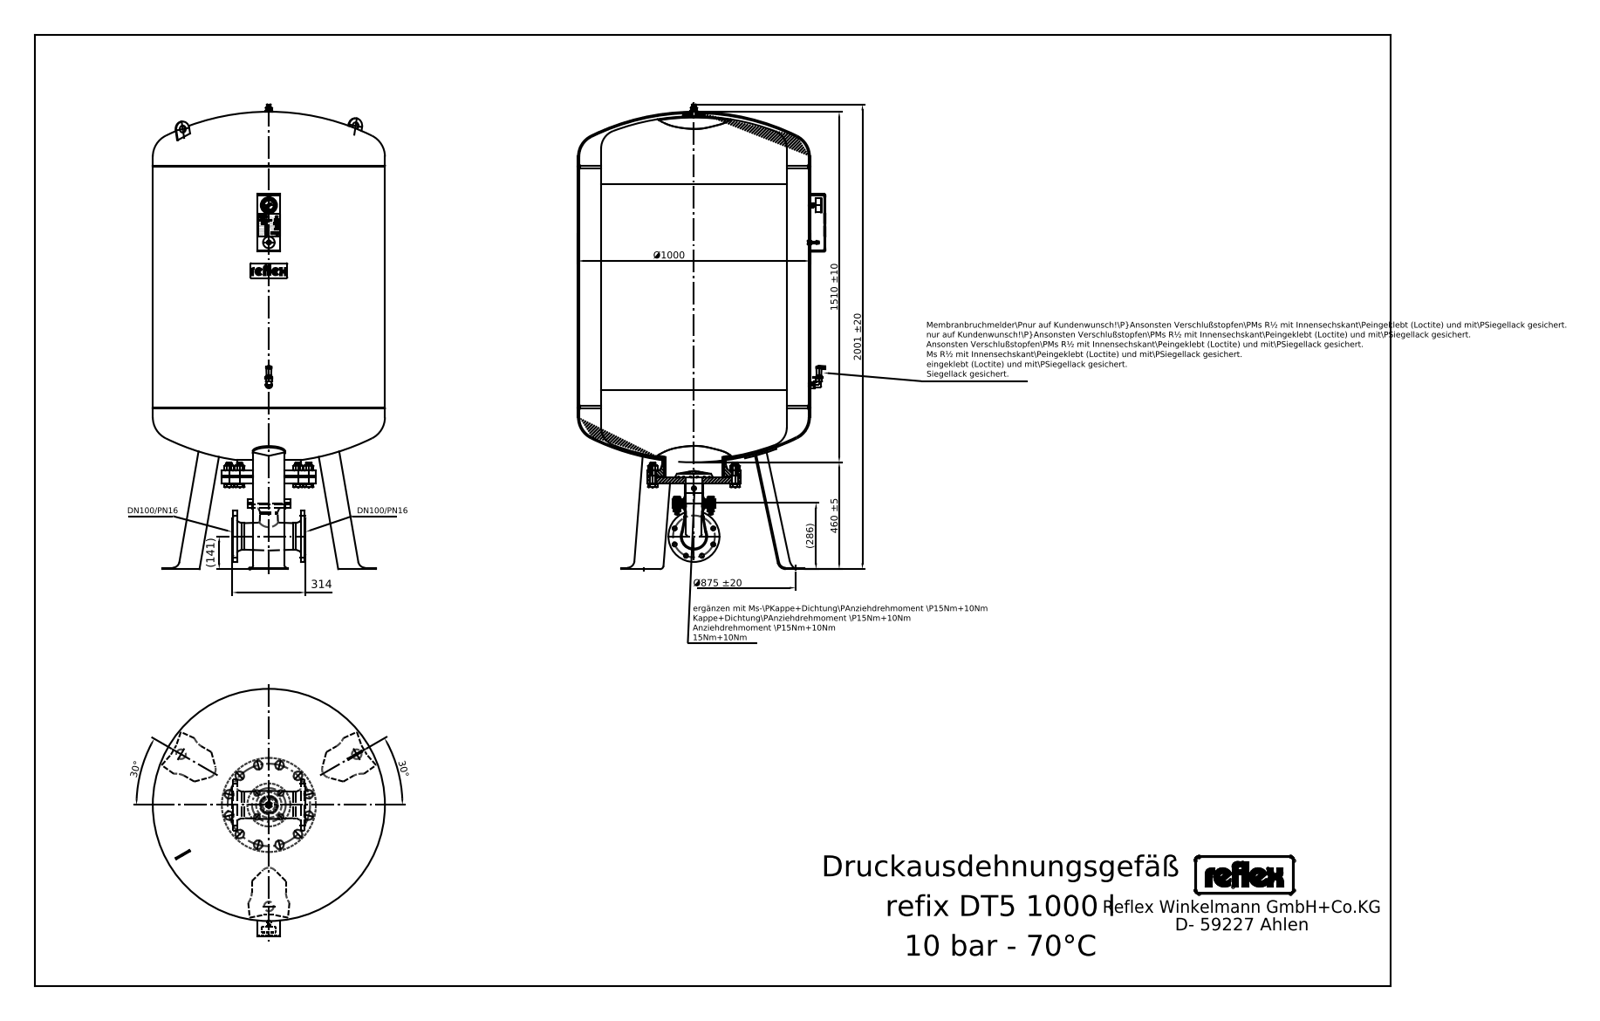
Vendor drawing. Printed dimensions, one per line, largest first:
2001 ±20
1510 ±10
Ø1000
Ø875 ±20
460 ±5
314
(286)
(141)
30°
30°
